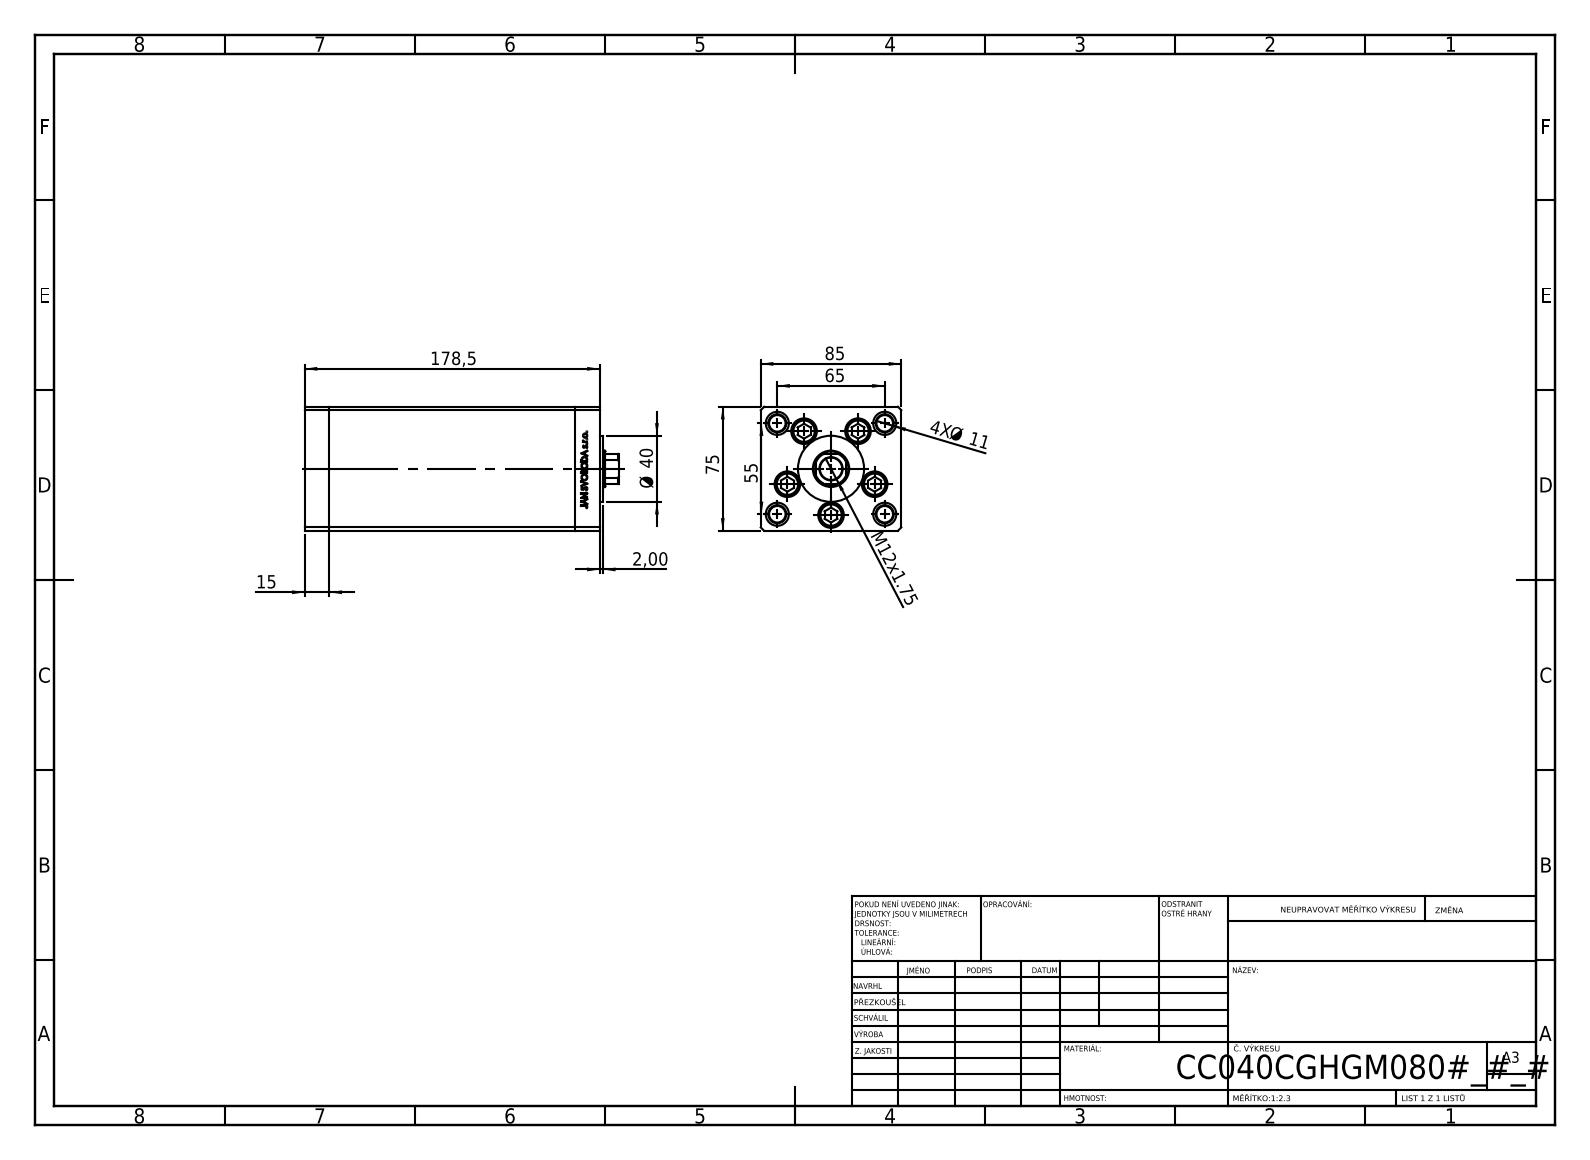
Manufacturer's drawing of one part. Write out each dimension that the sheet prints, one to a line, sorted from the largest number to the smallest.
178,5
85
75
65
55
Ø 40
15
M12x1.75
4X Ø 11
2,00
